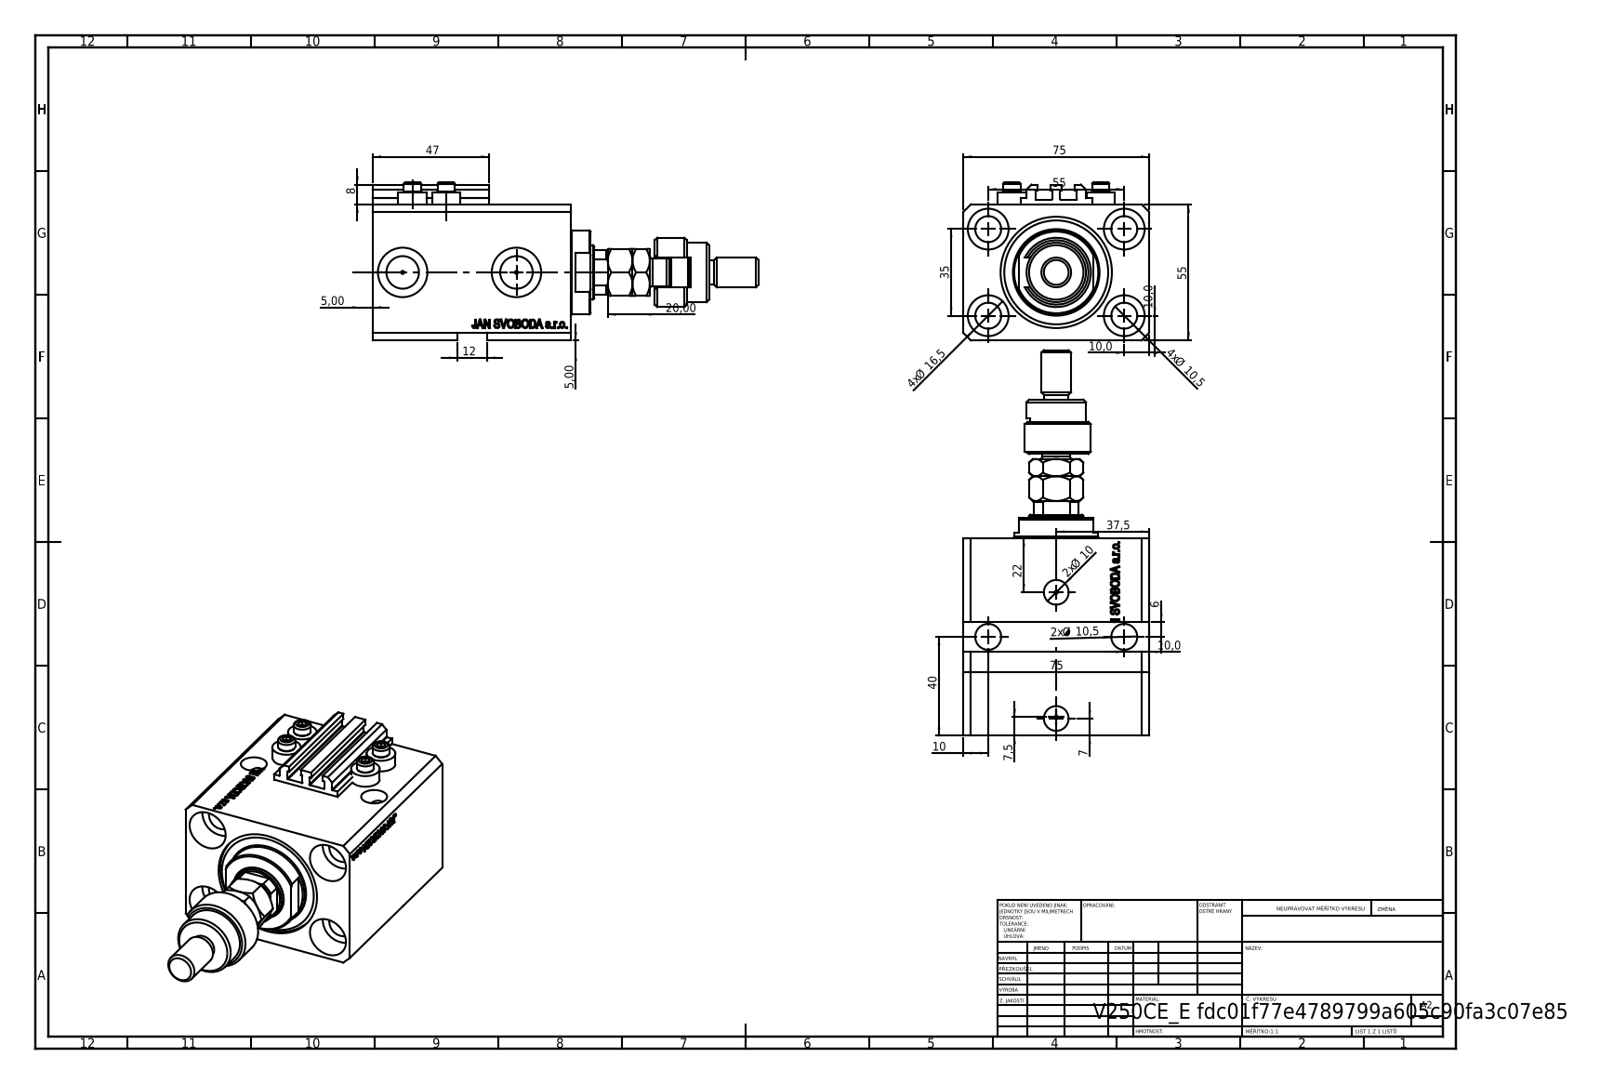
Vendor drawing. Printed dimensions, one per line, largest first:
75
75
55
55
47
40
37,5
35
22
20,00
4x Ø 16,5
12
4x Ø 10,5
2x Ø 10,5
10,0
10,0
2x Ø 10
10,0
10
8
7,5
7
6
5,00
5,00
